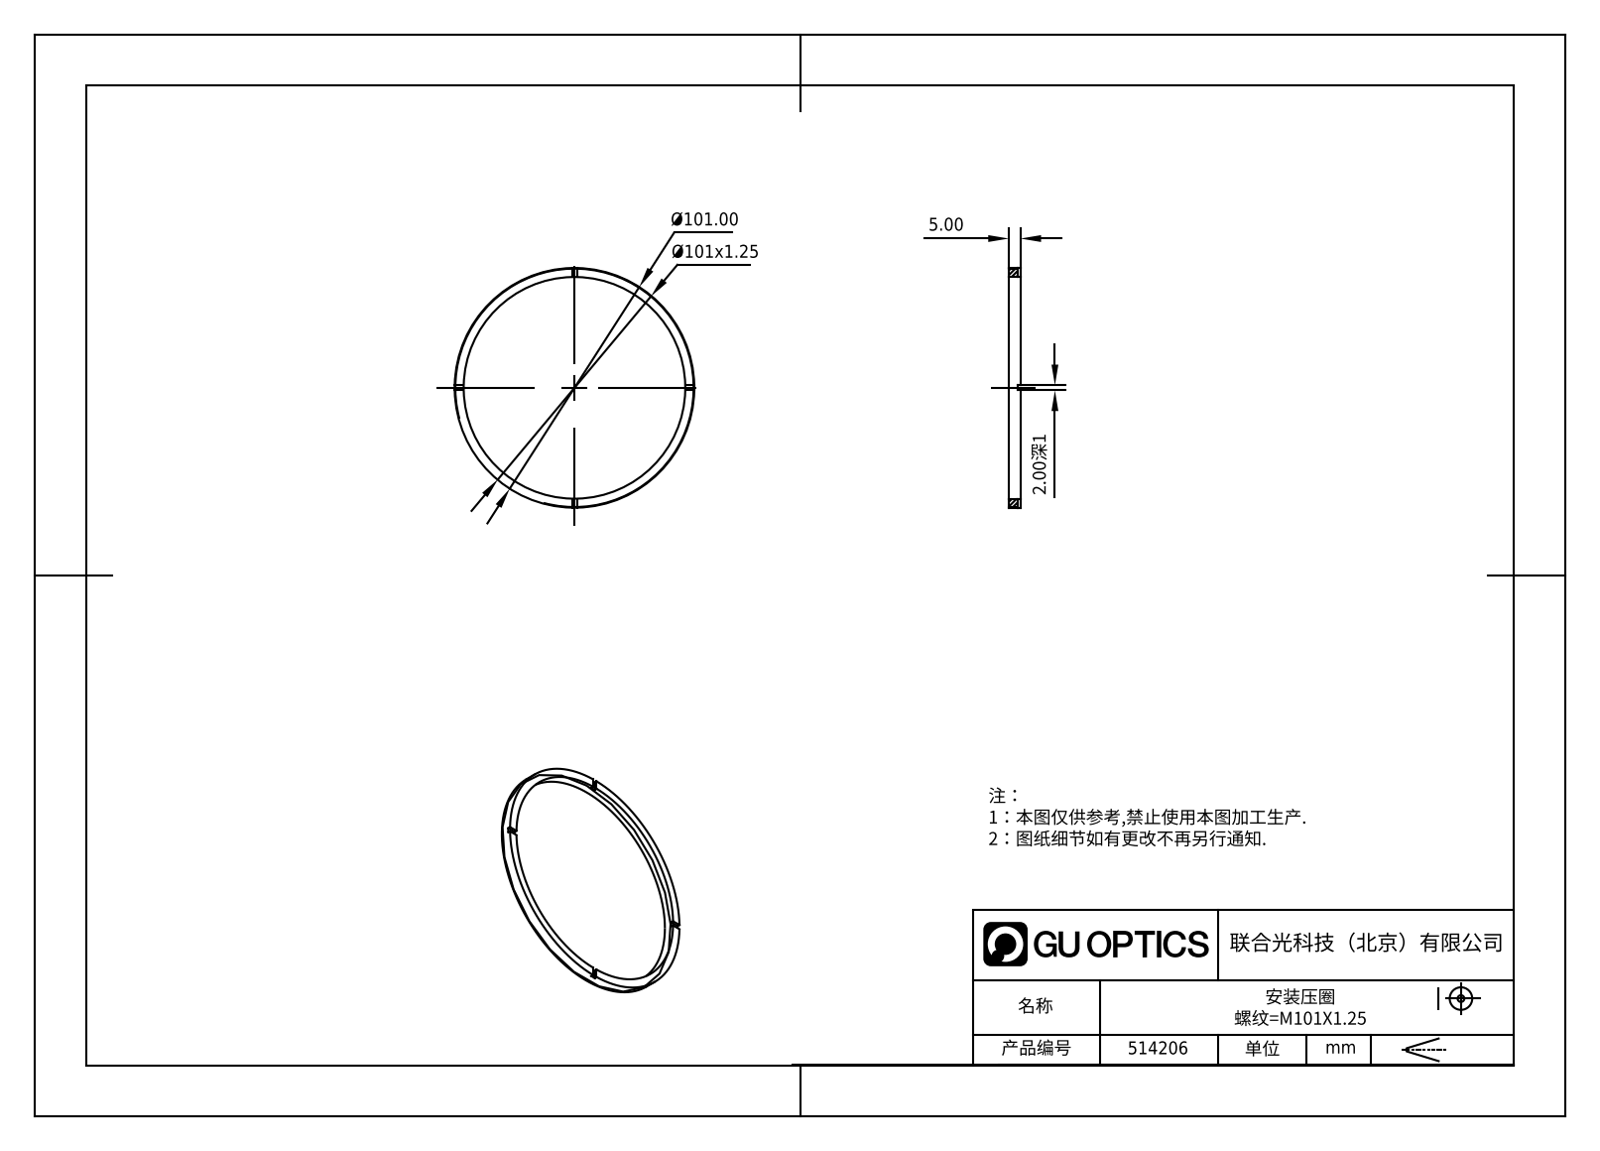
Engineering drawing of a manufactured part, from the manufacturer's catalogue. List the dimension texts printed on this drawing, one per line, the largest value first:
Ø101.00
Ø101x1.25
5.00
2.00深1
